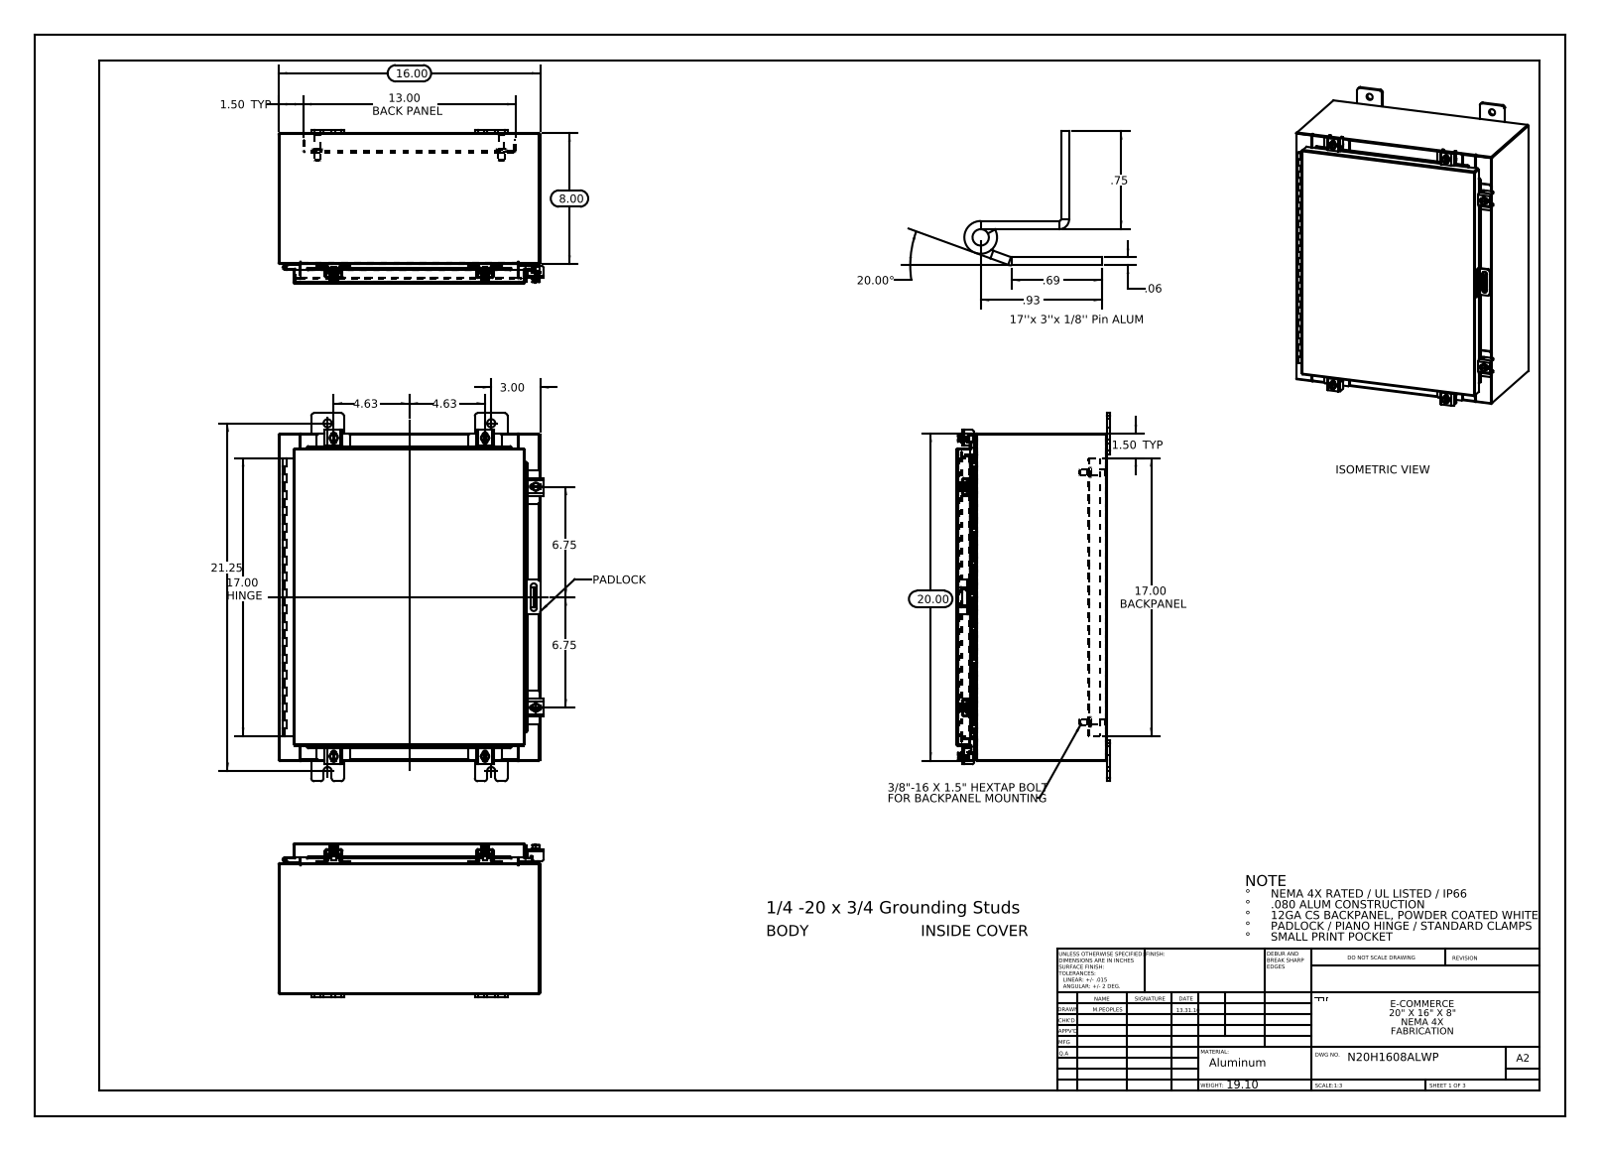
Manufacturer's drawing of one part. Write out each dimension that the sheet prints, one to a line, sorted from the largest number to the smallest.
21.25
20.00
20.00°
17.00 HINGE
17.00 BACKPANEL
16.00
13.00 BACK PANEL
8.00
6.75
6.75
4.63
4.63
3.00
1.50 TYP
1.50 TYP
.93
.75
.69
.06
